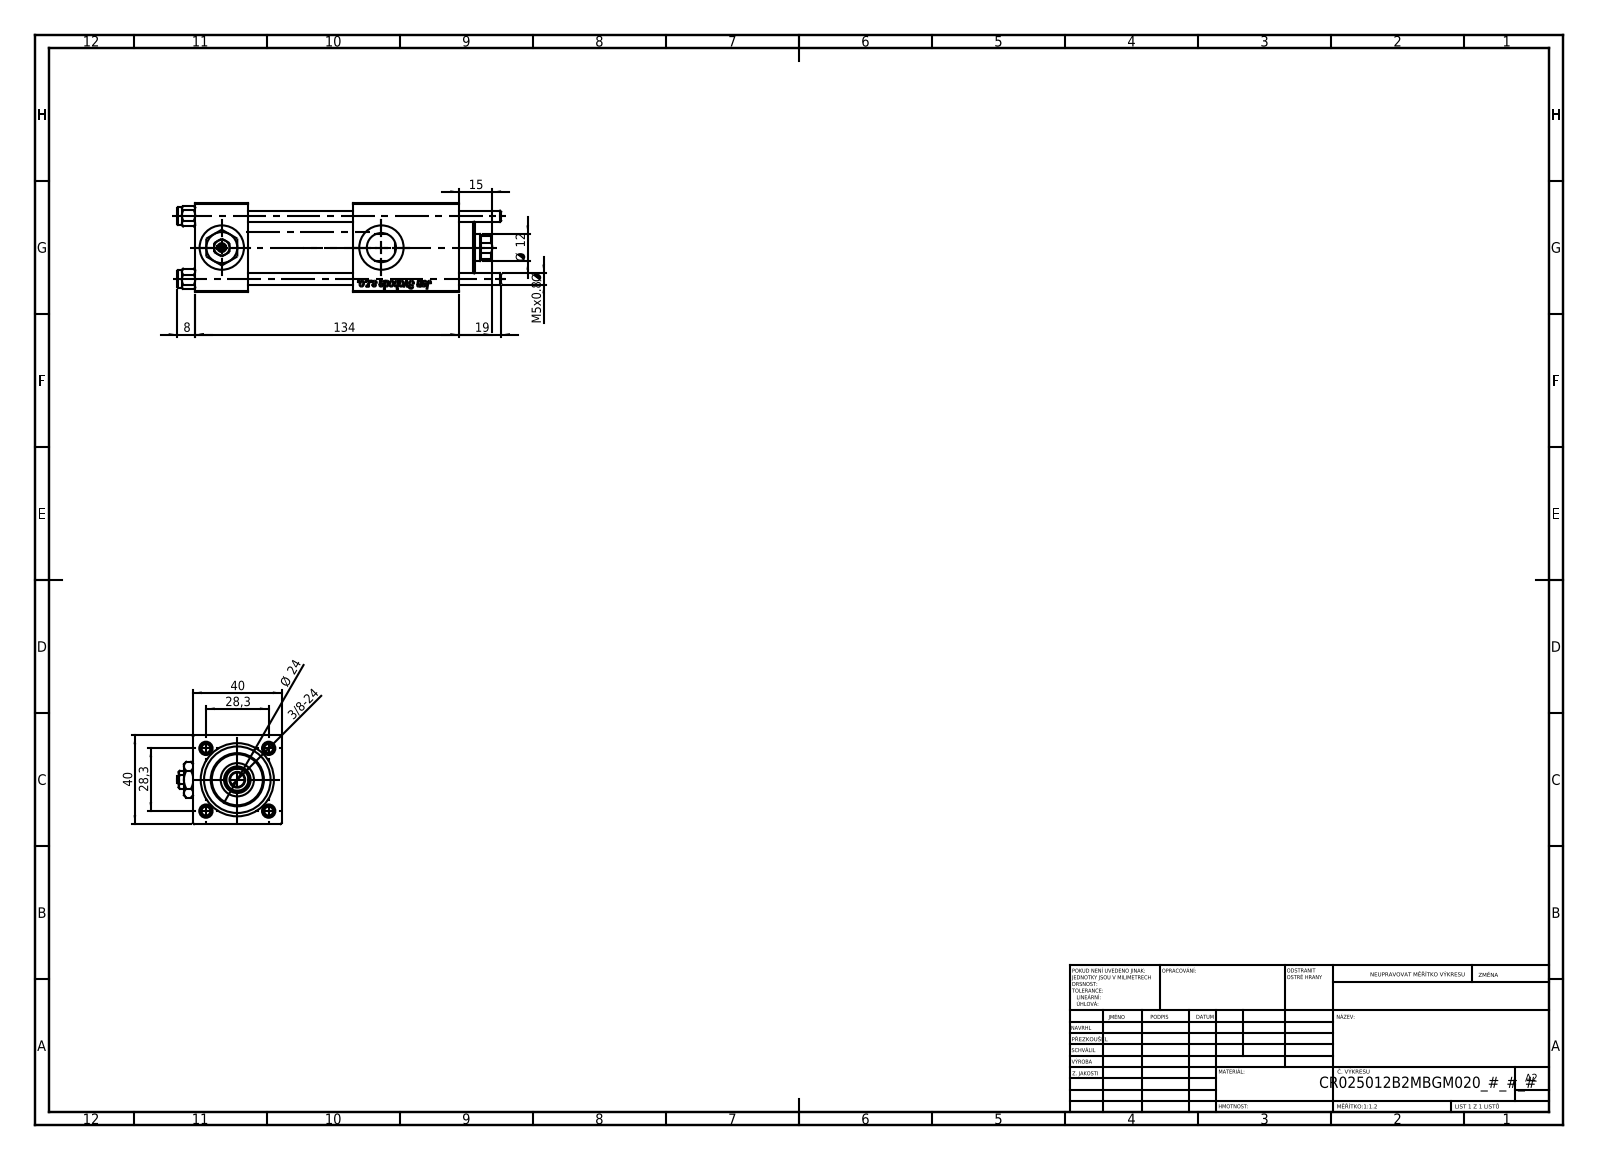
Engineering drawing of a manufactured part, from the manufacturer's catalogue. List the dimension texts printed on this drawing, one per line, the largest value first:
134
40
40
28,3
28,3
Ø 24
19
15
Ø 12
8
M5x0.8 Ø
3/8-24
